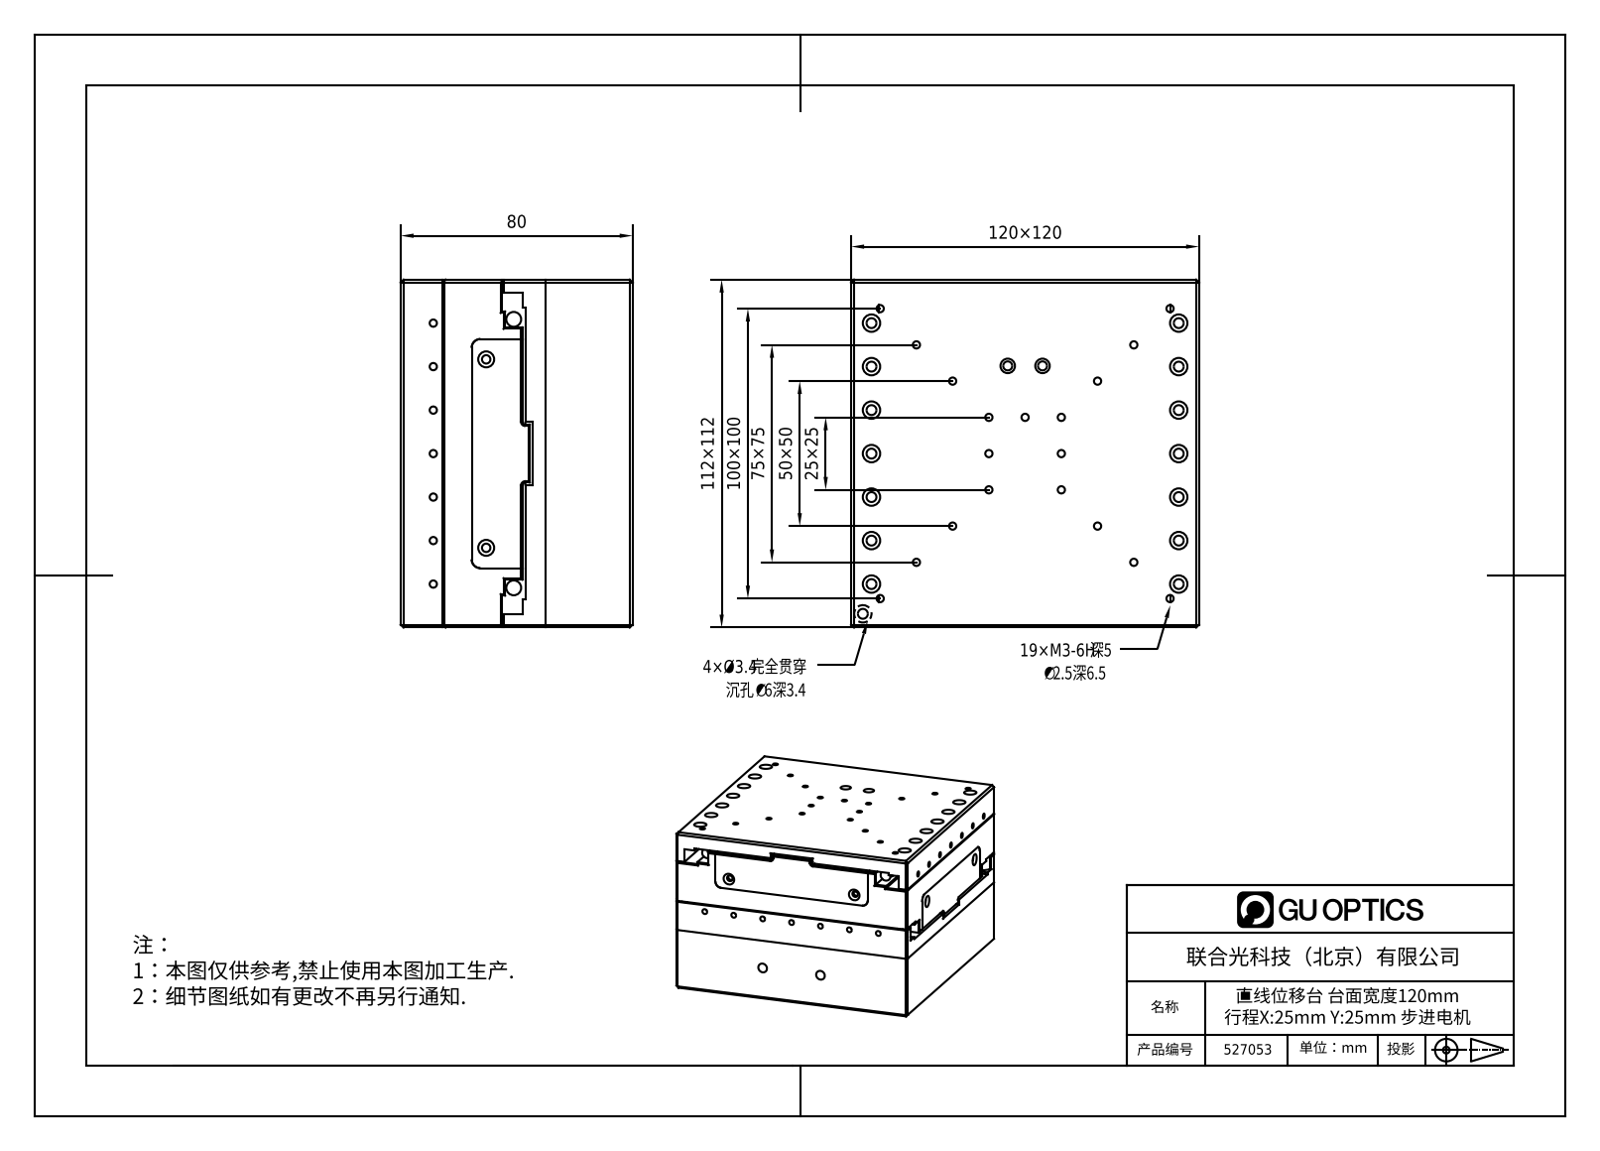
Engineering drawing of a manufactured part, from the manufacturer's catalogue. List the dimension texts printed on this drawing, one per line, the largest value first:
120×120
112×112
100×100
80
75×75
50×50
25×25
